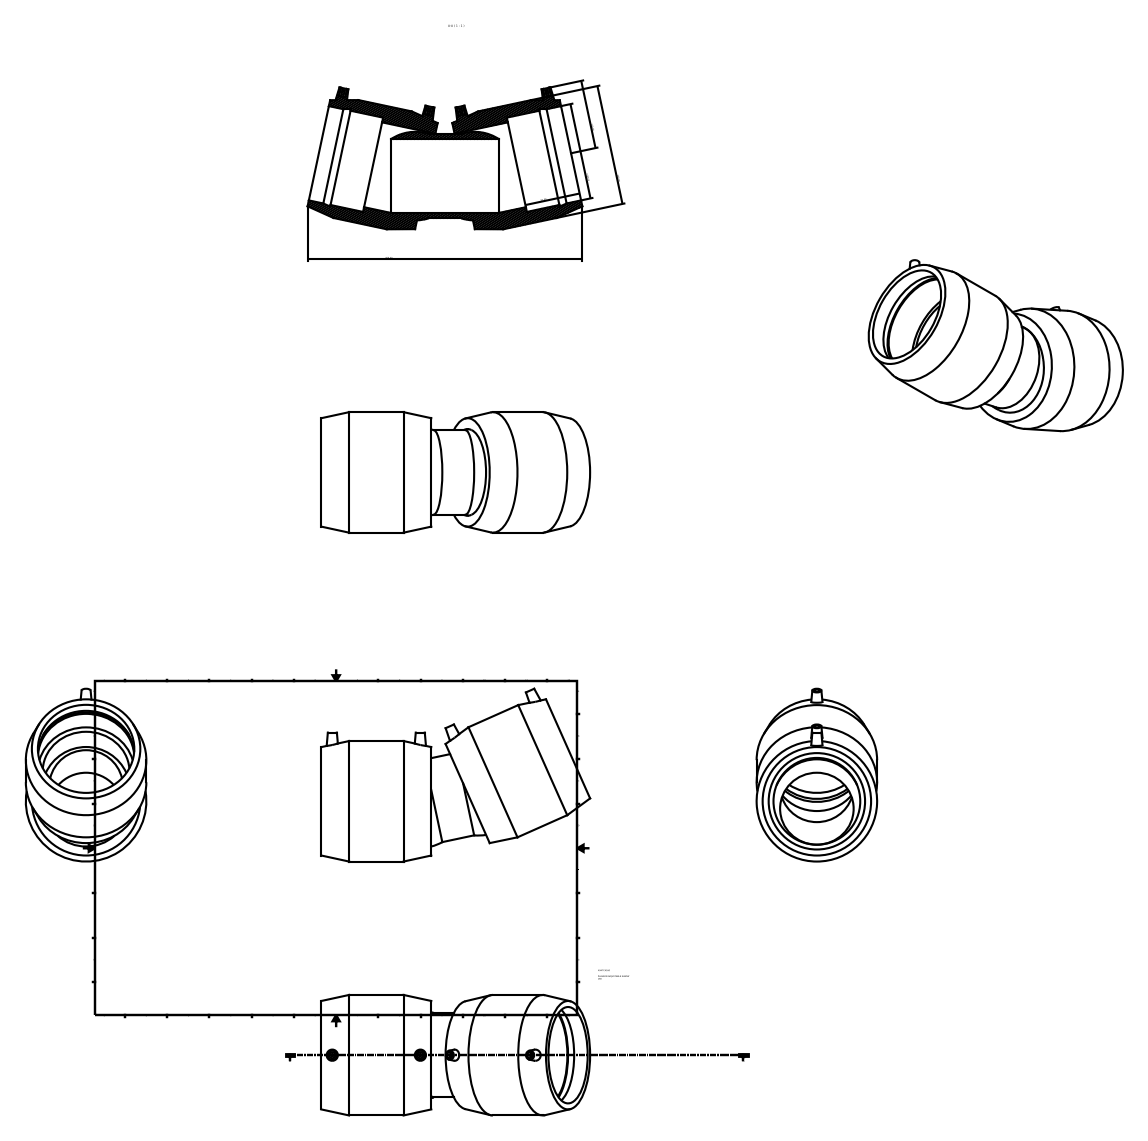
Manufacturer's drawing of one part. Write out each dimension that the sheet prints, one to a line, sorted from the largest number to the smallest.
456,00
200,00
n160,00
114,00
92,00
